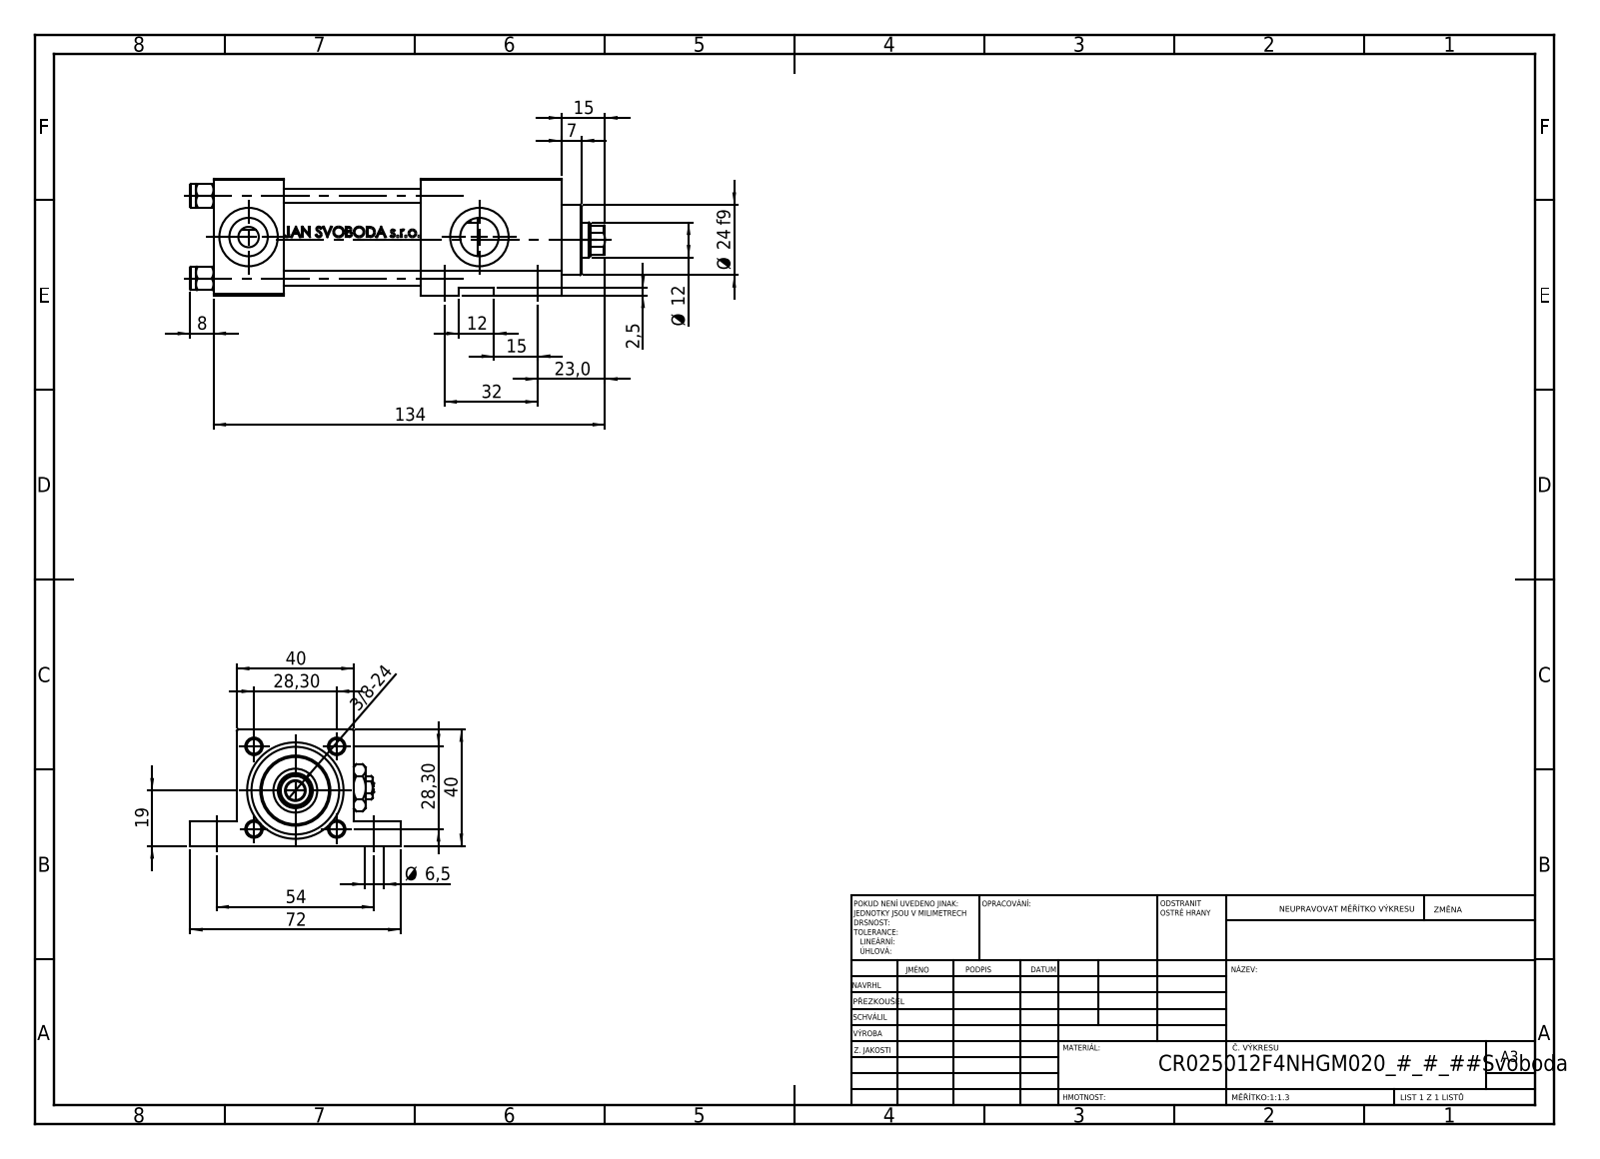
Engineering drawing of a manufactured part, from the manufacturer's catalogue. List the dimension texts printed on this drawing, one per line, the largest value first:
134
72
54
40
40
32
28,30
28,30
Ø 24 f9
23,0
19
15
15
12
Ø 12
8
7
Ø 6,5
2,5
3/8-24
